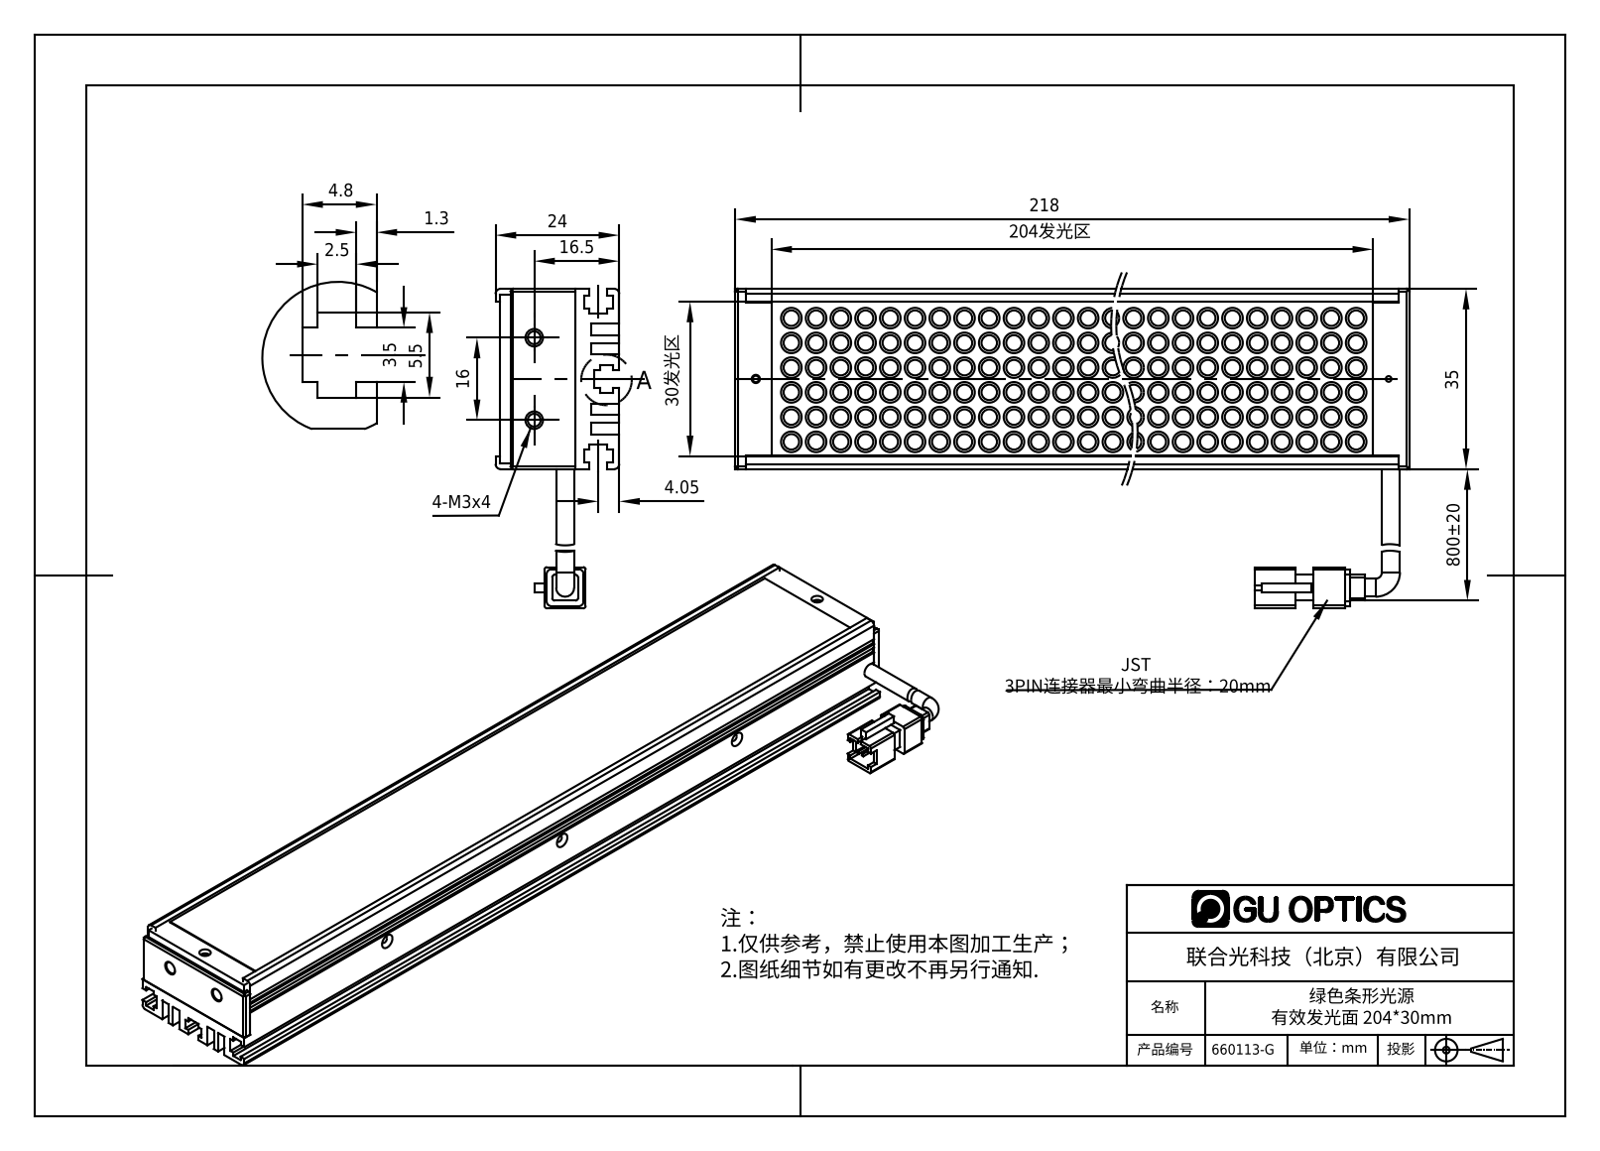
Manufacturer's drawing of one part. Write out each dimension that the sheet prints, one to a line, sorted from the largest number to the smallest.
800±20
218
204发光区
35
30发光区
24
16.5
16
5.5
4.8
4.05
3.5
2.5
1.3
